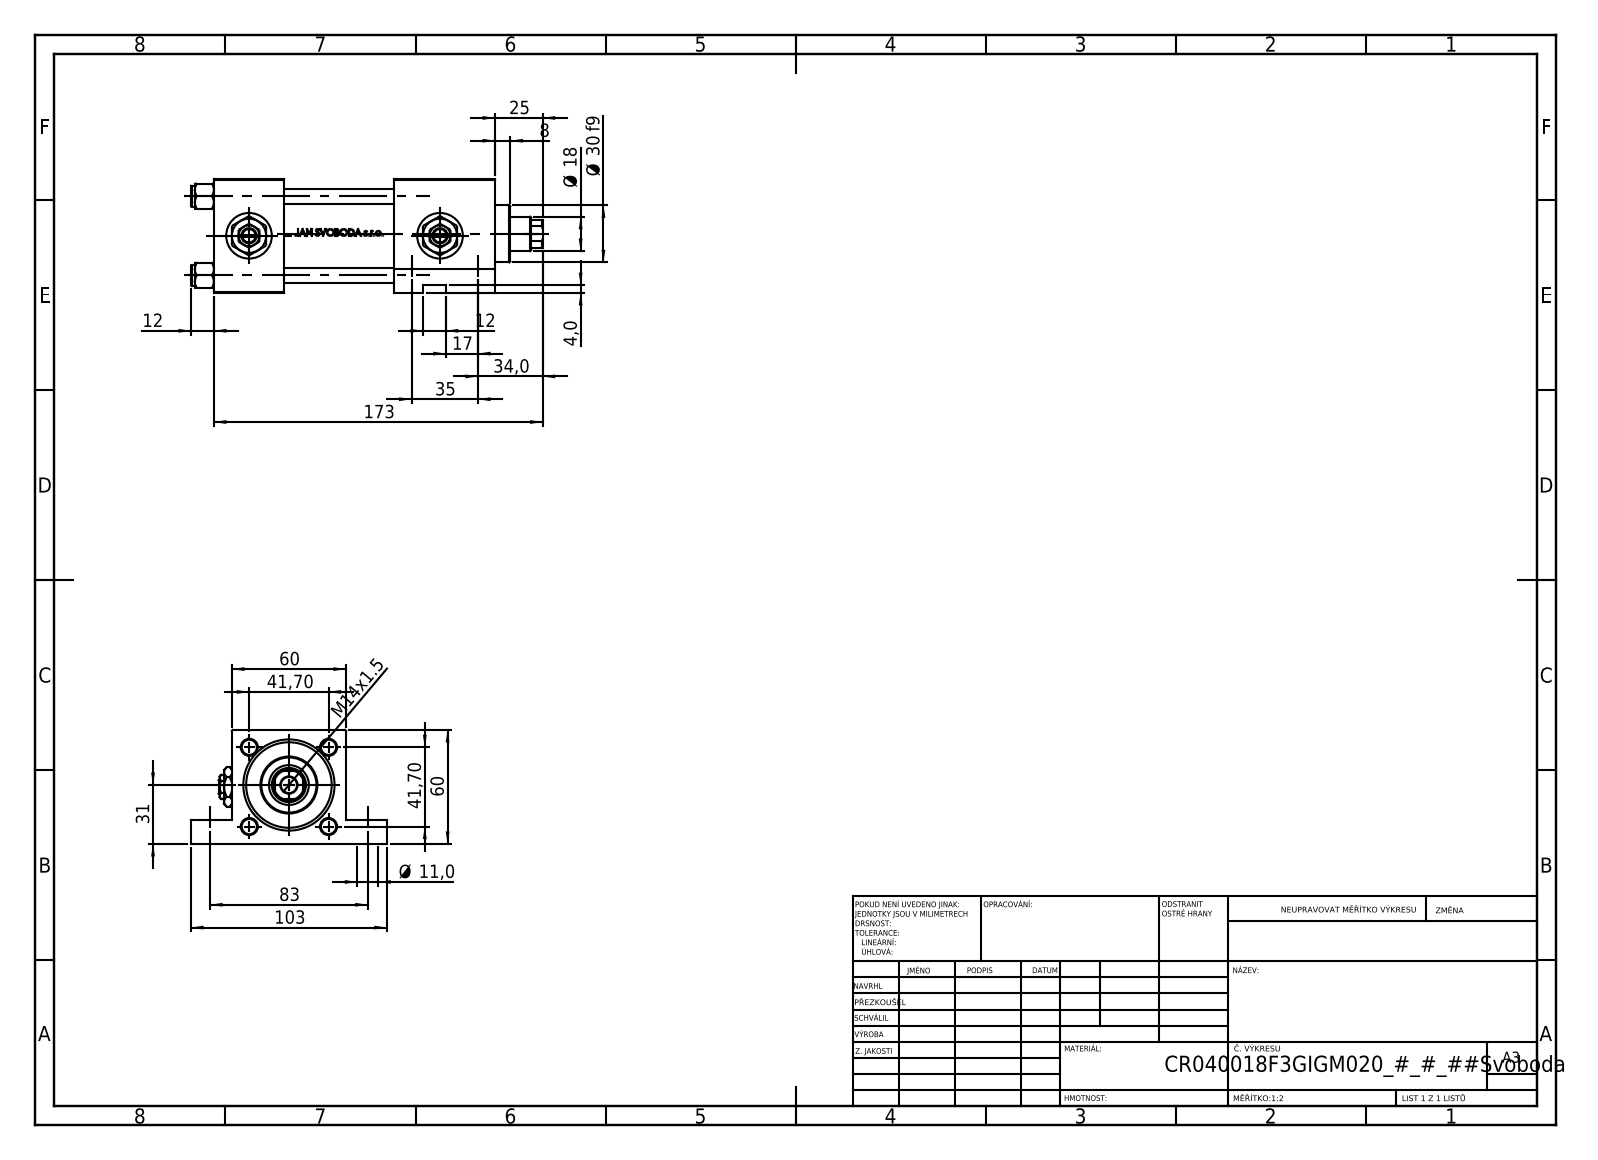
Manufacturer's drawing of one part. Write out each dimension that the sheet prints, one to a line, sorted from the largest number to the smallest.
173
103
83
60
60
41,70
41,70
35
34,0
31
Ø 30 f9
25
Ø 18
17
M14x1.5
12
12
Ø 11,0
8
4,0
